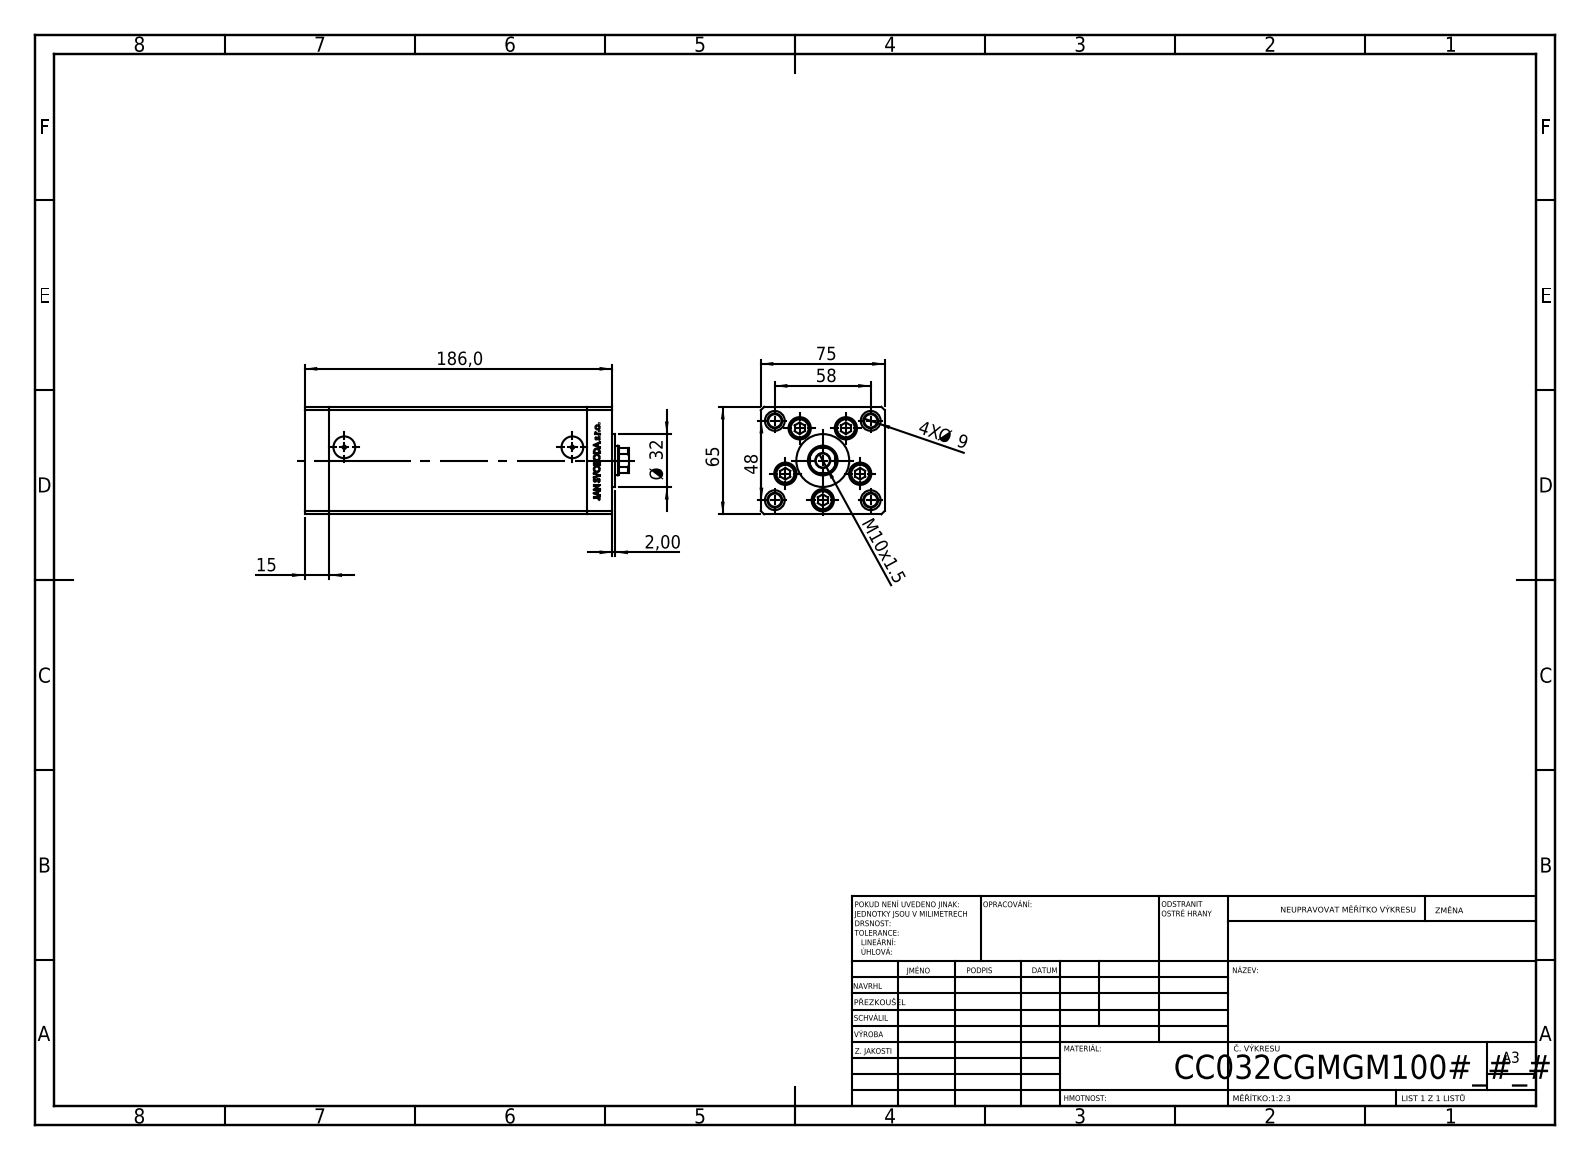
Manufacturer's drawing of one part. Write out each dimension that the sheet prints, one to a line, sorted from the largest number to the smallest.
186,0
75
65
58
48
Ø 32
15
M10x1.5
4X Ø 9
2,00
